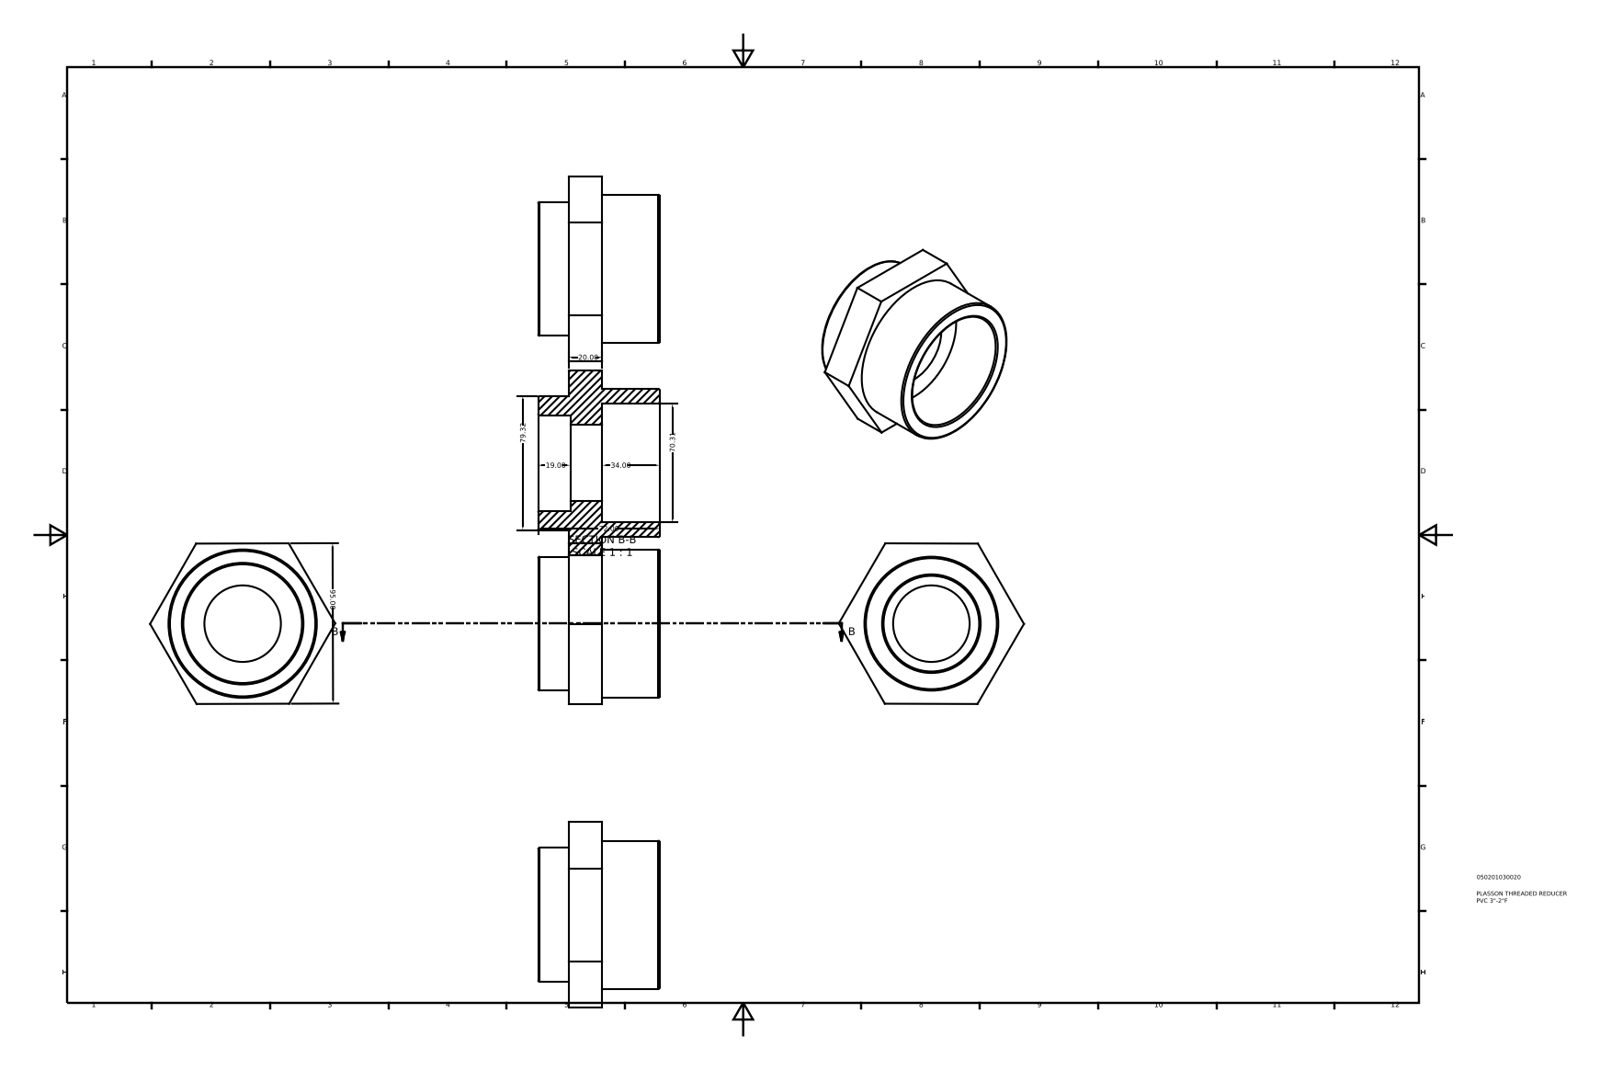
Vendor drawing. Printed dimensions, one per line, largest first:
95.00
79.32
72.00
70.31
34.00
20.00
19.00
